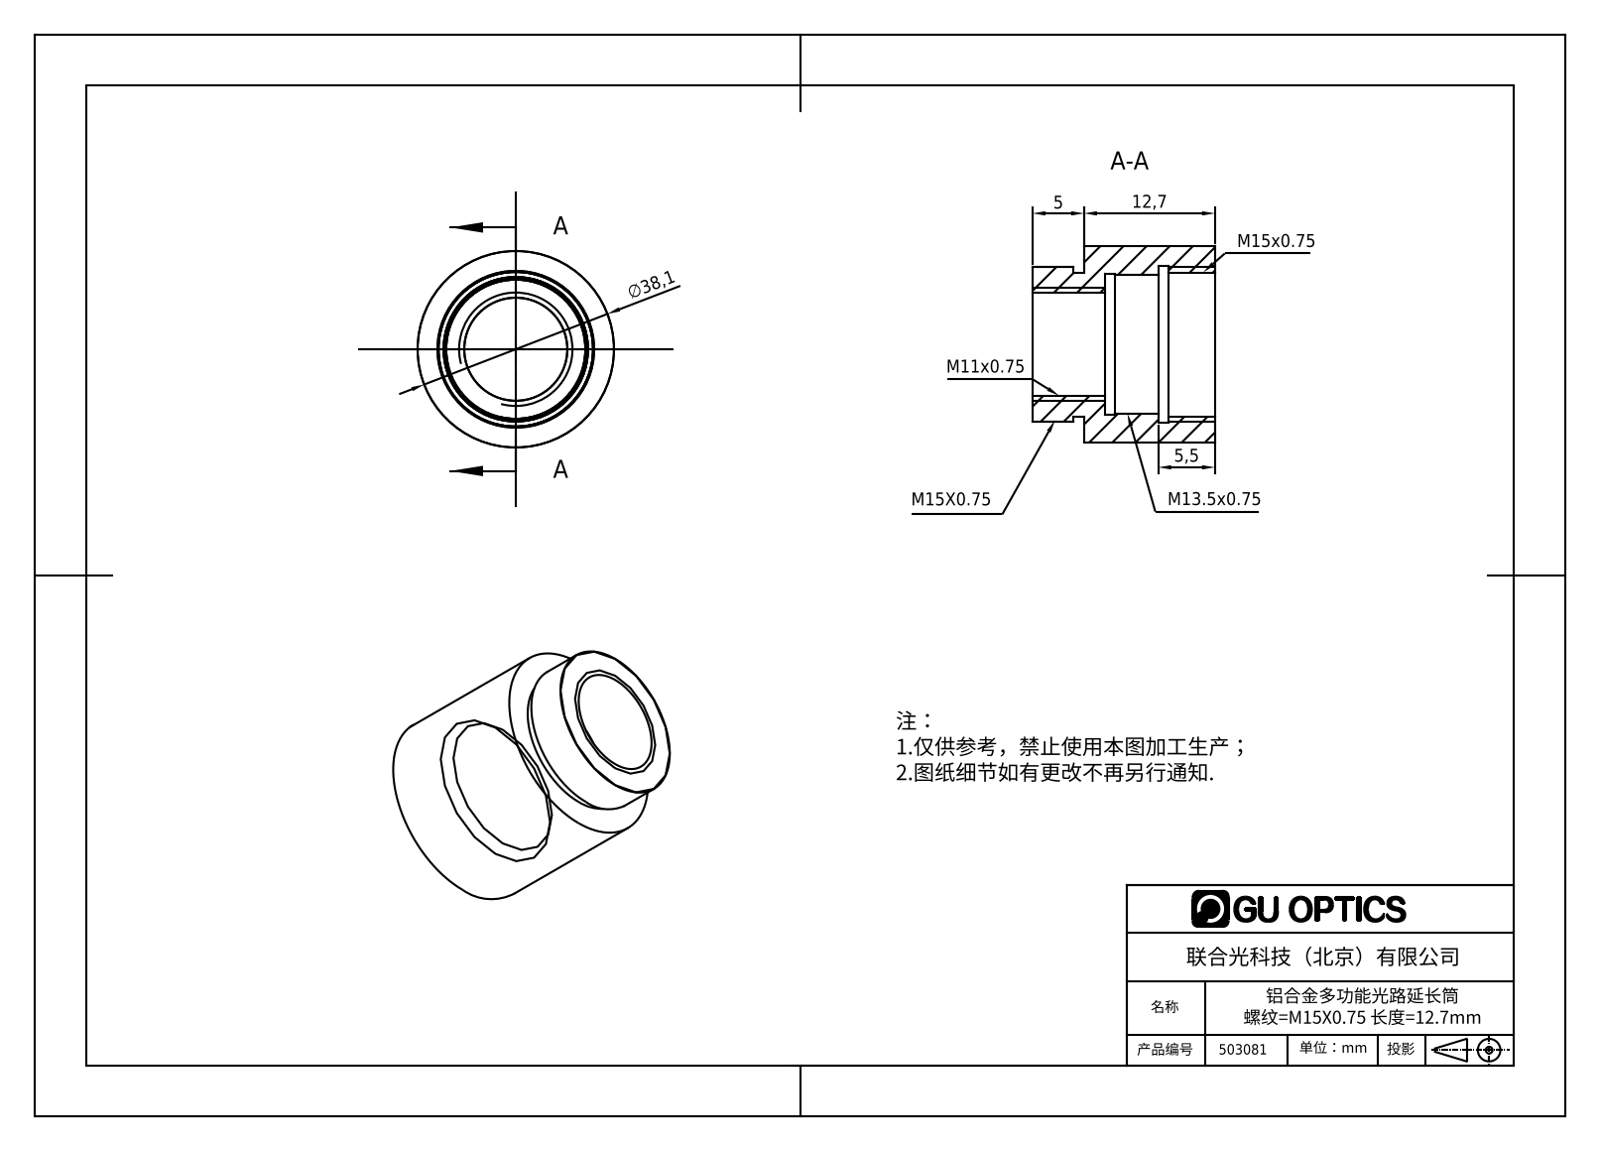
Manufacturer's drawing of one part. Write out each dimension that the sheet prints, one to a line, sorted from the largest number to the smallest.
∅38,1
12,7
5,5
5
